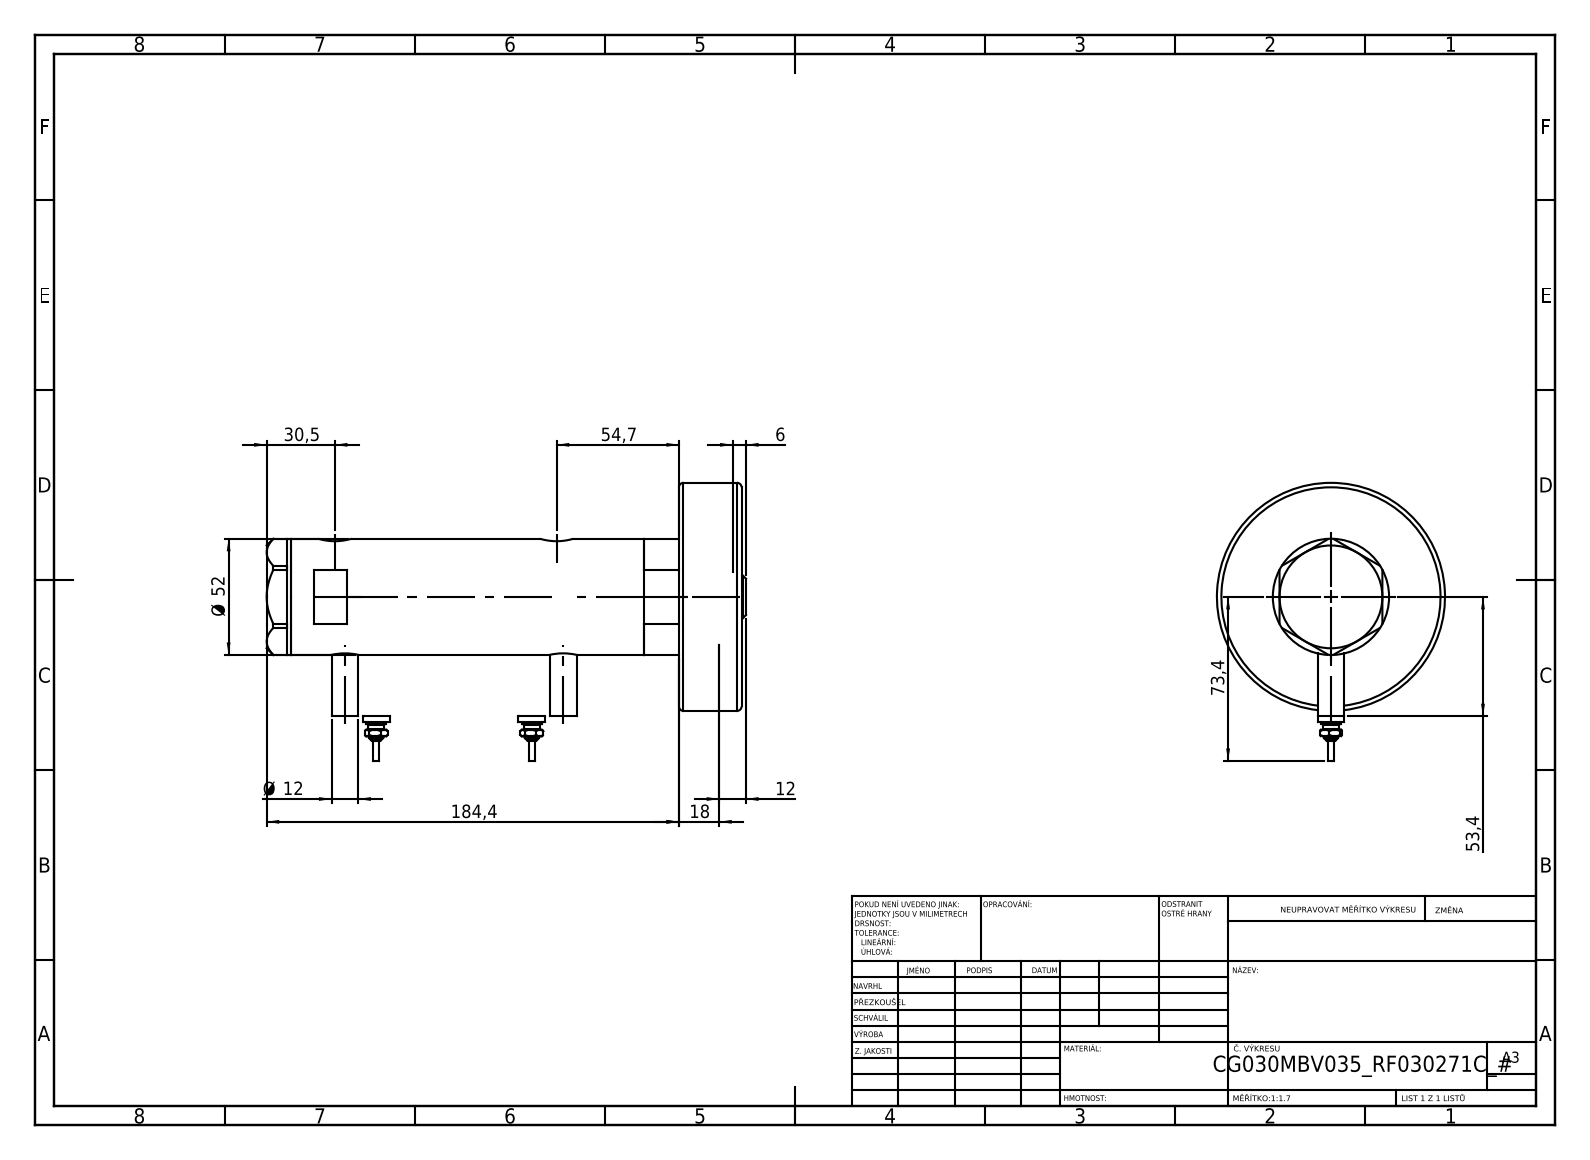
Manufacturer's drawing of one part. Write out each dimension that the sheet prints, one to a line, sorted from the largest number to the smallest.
184,4
73,4
54,7
53,4
Ø 52
30,5
18
12
Ø 12
6
